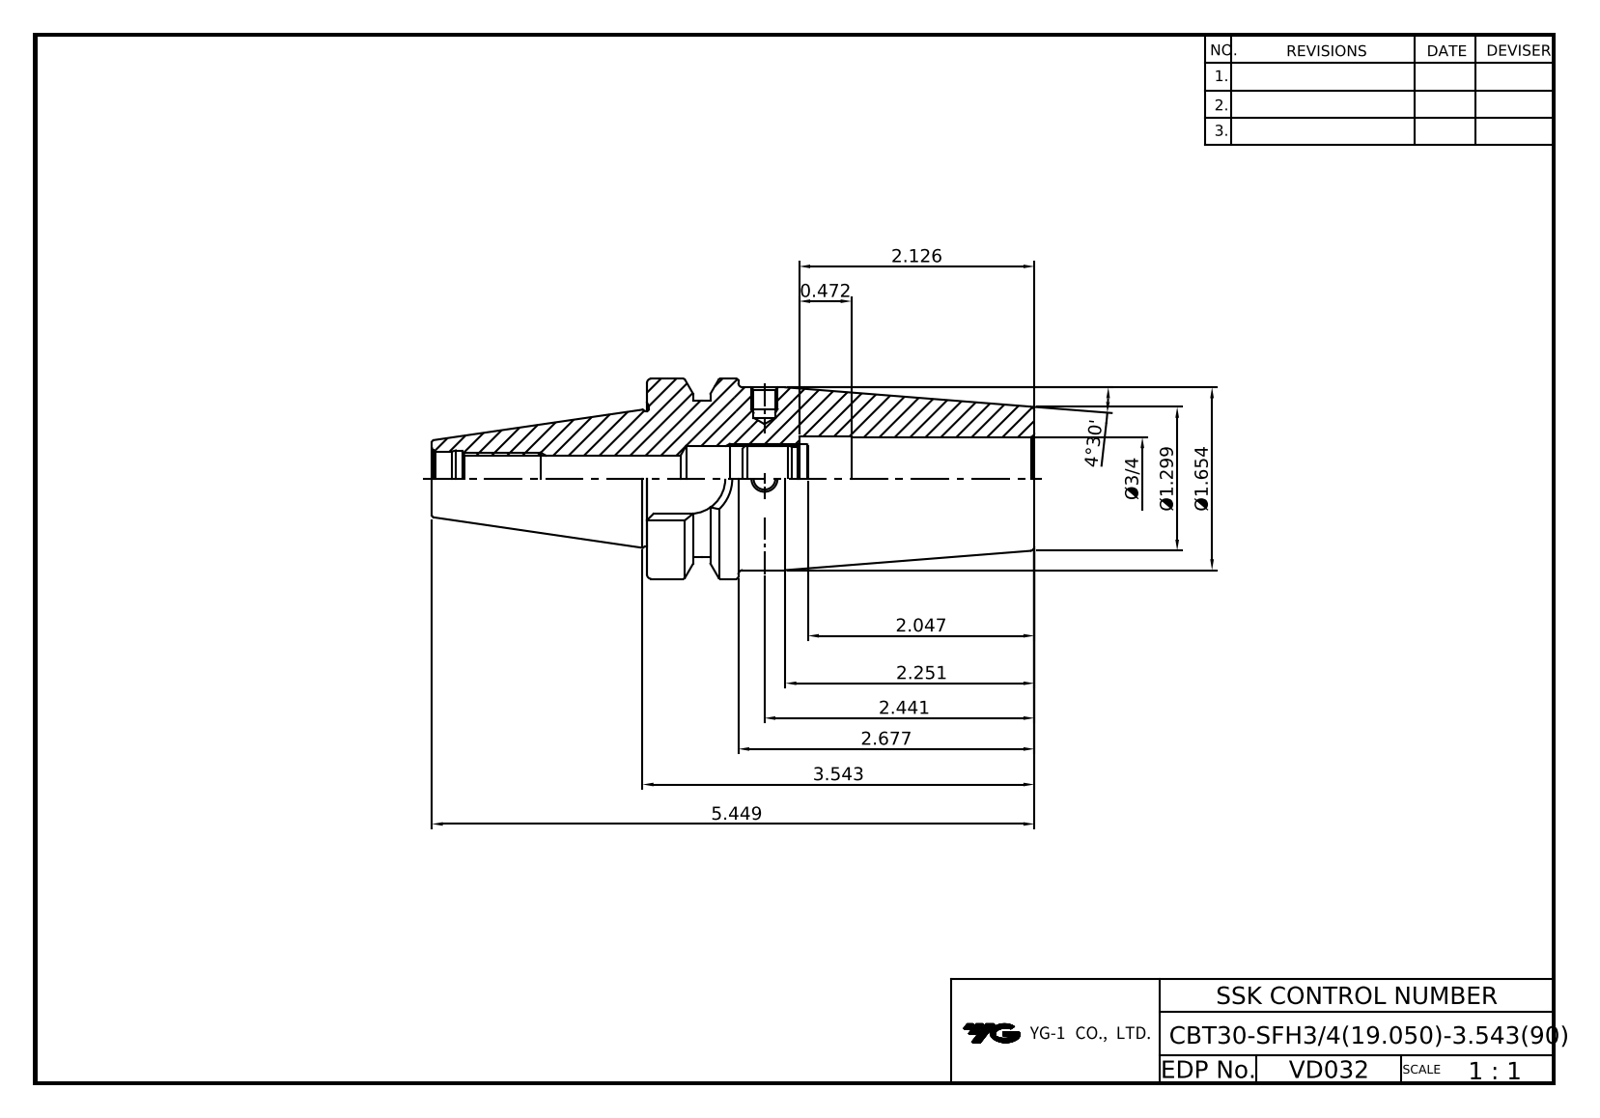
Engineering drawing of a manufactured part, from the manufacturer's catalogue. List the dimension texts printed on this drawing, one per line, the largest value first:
5.449
4°30'
3.543
2.677
2.441
2.251
2.126
2.047
Ø1.654
Ø1.299
0.472
